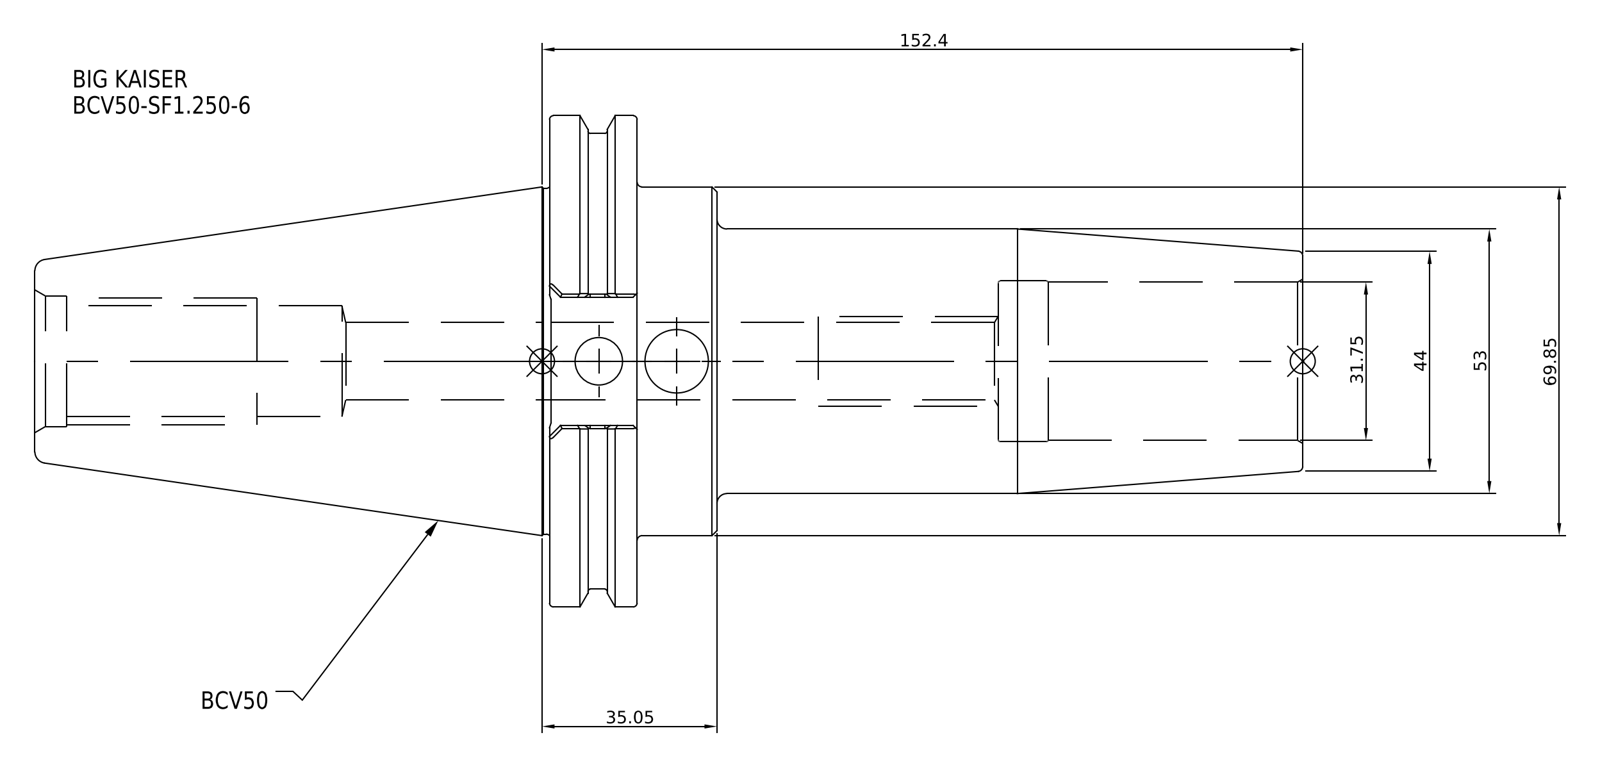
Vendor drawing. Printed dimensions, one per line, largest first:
152.4
69.85
53
44
35.05
31.75
